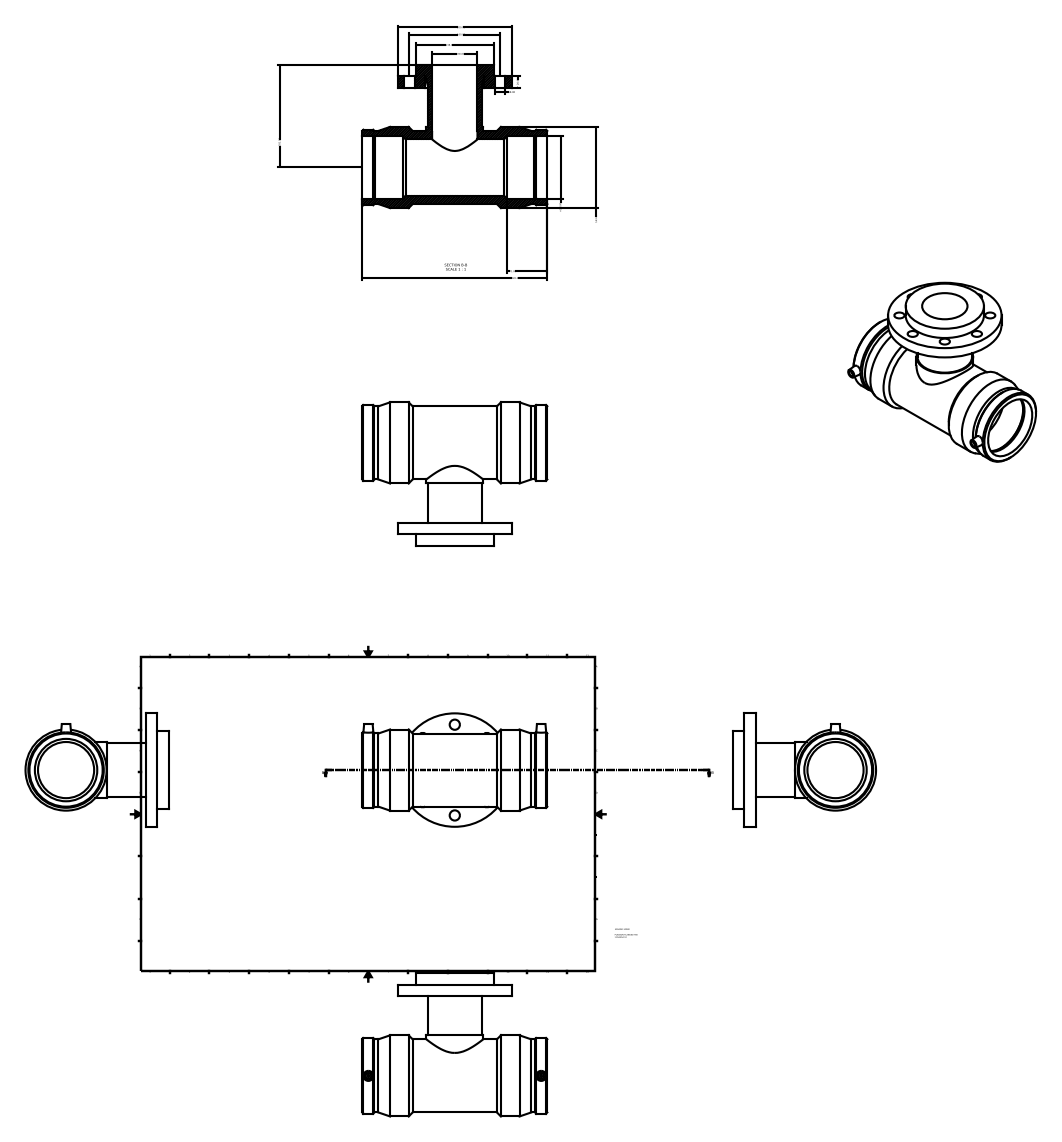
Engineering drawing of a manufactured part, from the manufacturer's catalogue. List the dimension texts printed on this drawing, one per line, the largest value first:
326.00
200.00
181.00
160.00
143.00
138.00
n110.00
n80.00
71.00
20.00
18.00
